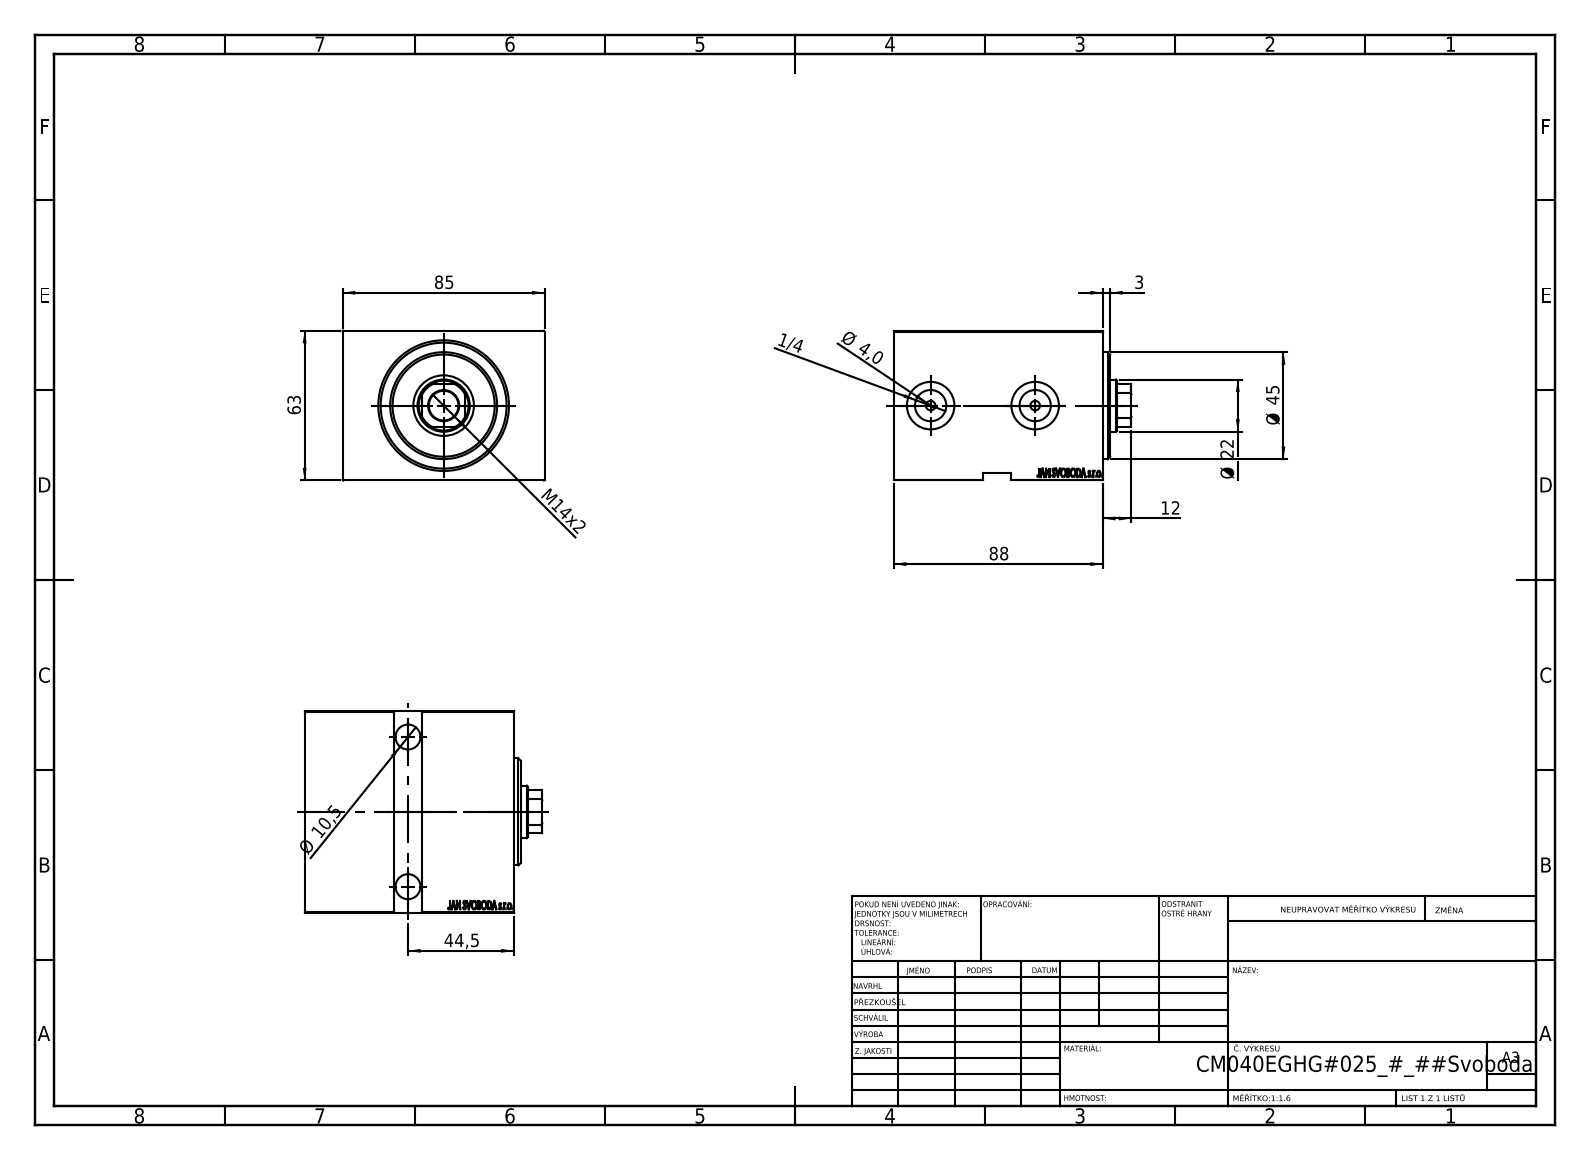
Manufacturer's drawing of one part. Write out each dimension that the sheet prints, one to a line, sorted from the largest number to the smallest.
88
85
63
Ø 45
44,5
Ø 22
M14x2
12
Ø 10,5
Ø 4,0
3
1/4
